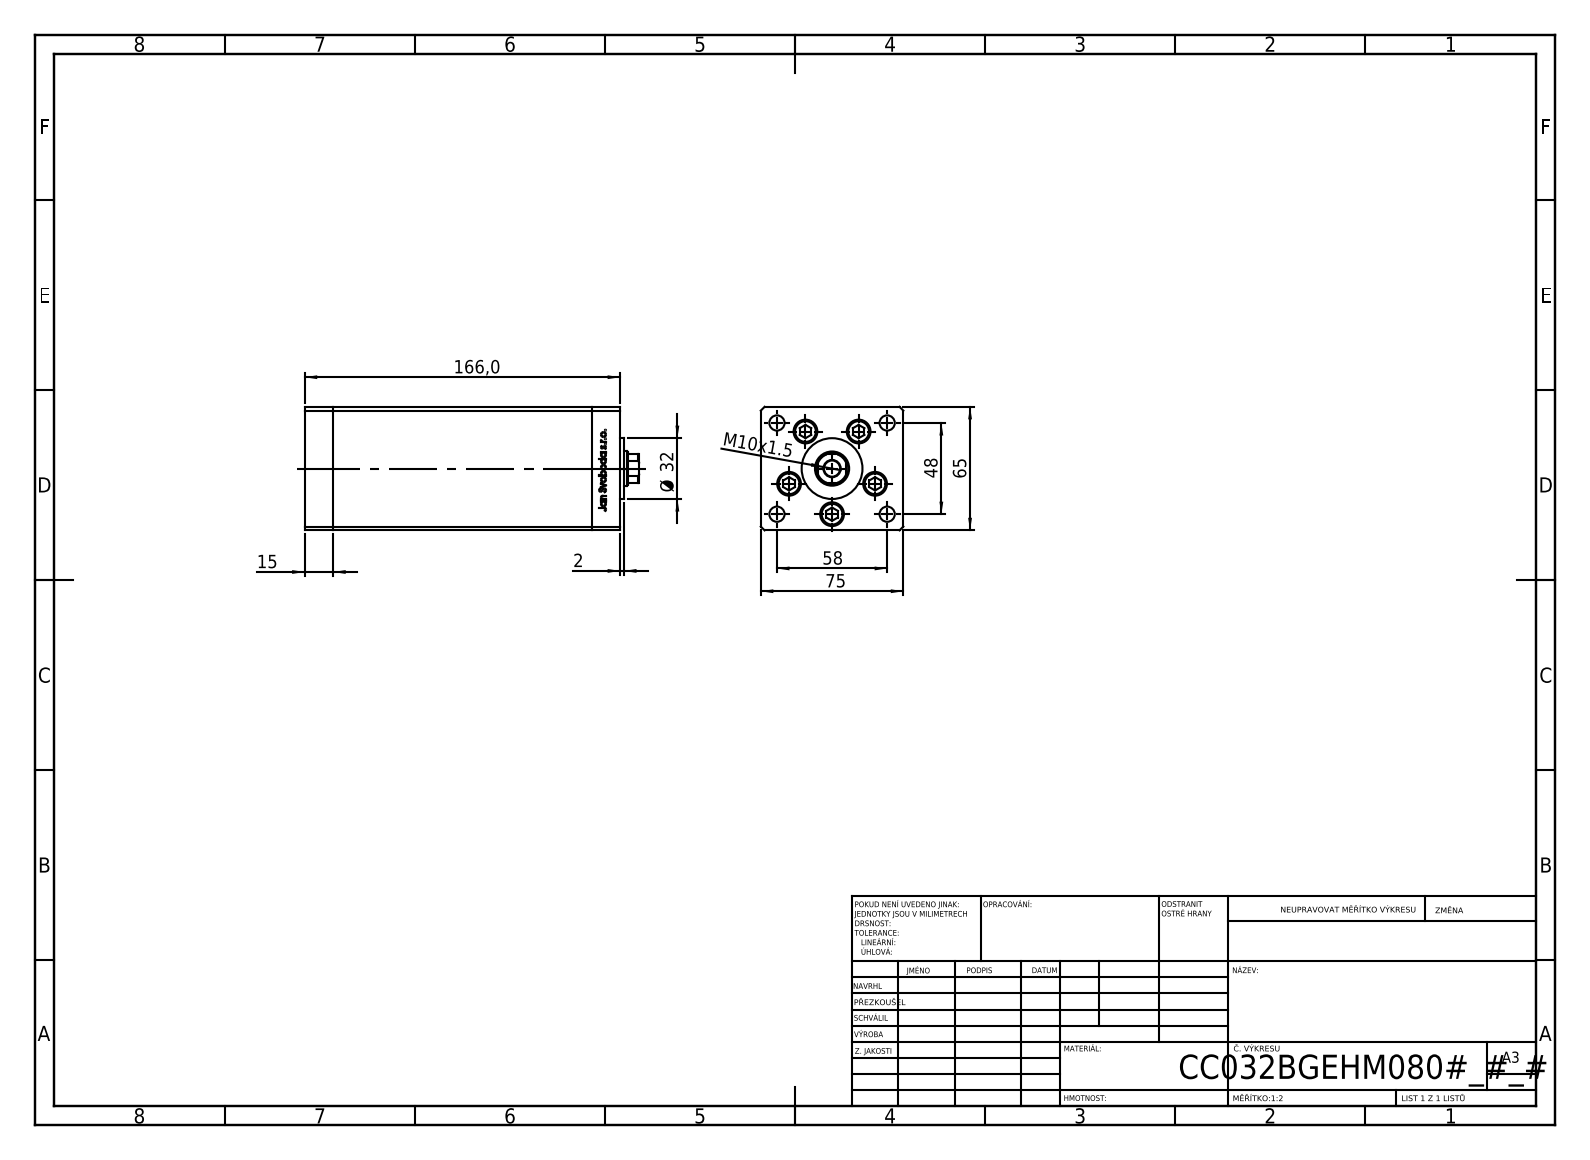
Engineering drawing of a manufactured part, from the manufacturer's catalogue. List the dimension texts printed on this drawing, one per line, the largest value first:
166,0
75
65
58
48
Ø 32
15
M10x1.5
2
